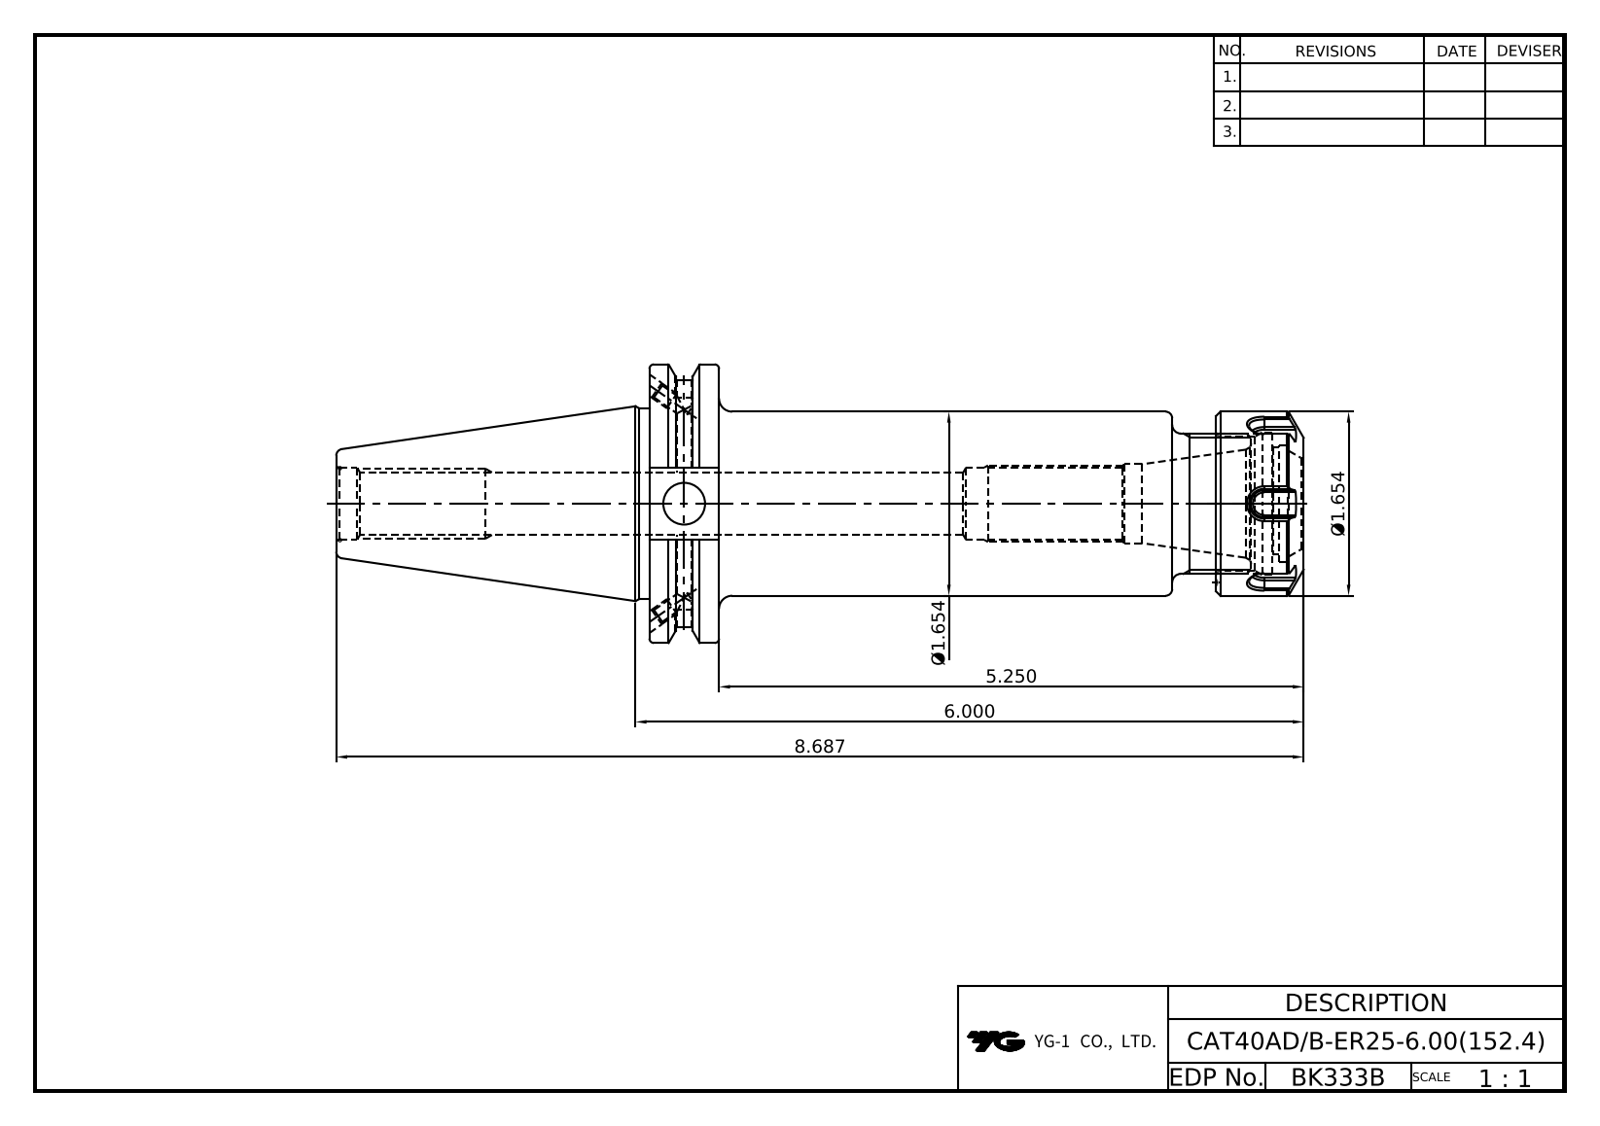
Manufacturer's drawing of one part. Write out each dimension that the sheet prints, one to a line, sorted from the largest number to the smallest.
8.687
6.000
5.250
Ø1.654
Ø1.654
